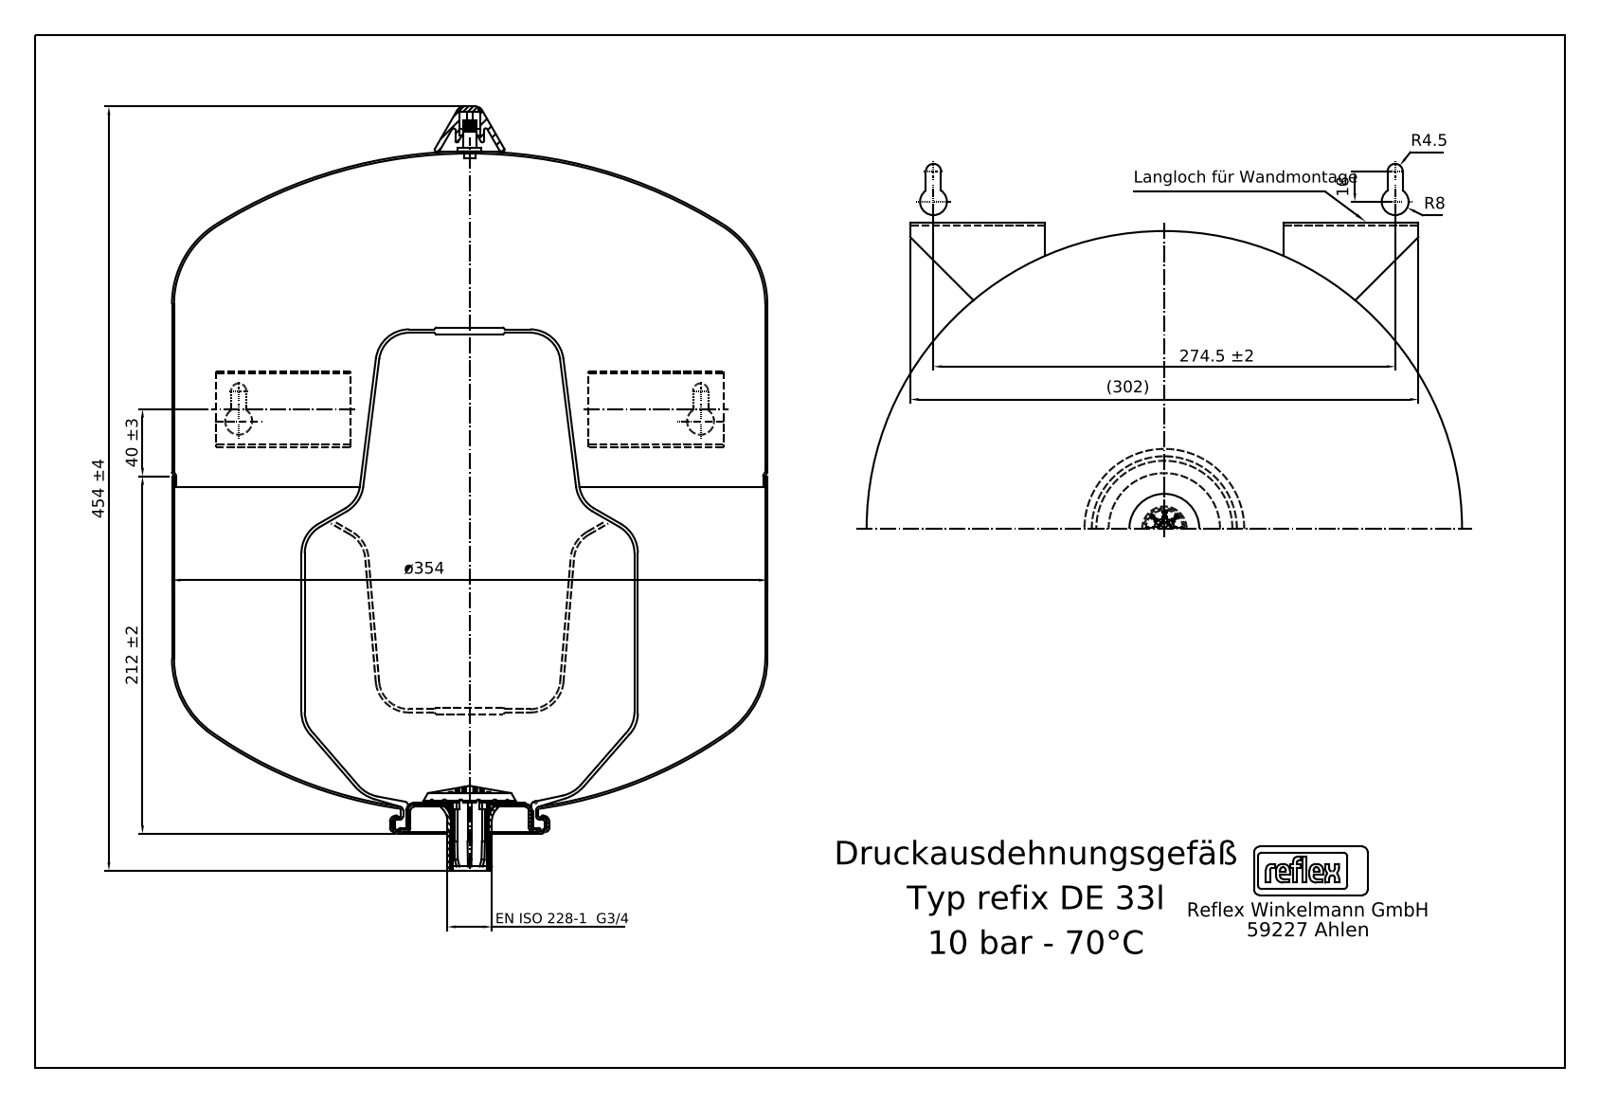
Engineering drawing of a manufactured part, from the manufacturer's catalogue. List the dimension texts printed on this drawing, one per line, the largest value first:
454 ±4
ø354
(302)
274.5 ±2
EN ISO 228-1 G3/4
212 ±2
40 ±3
18
R8
R4.5
